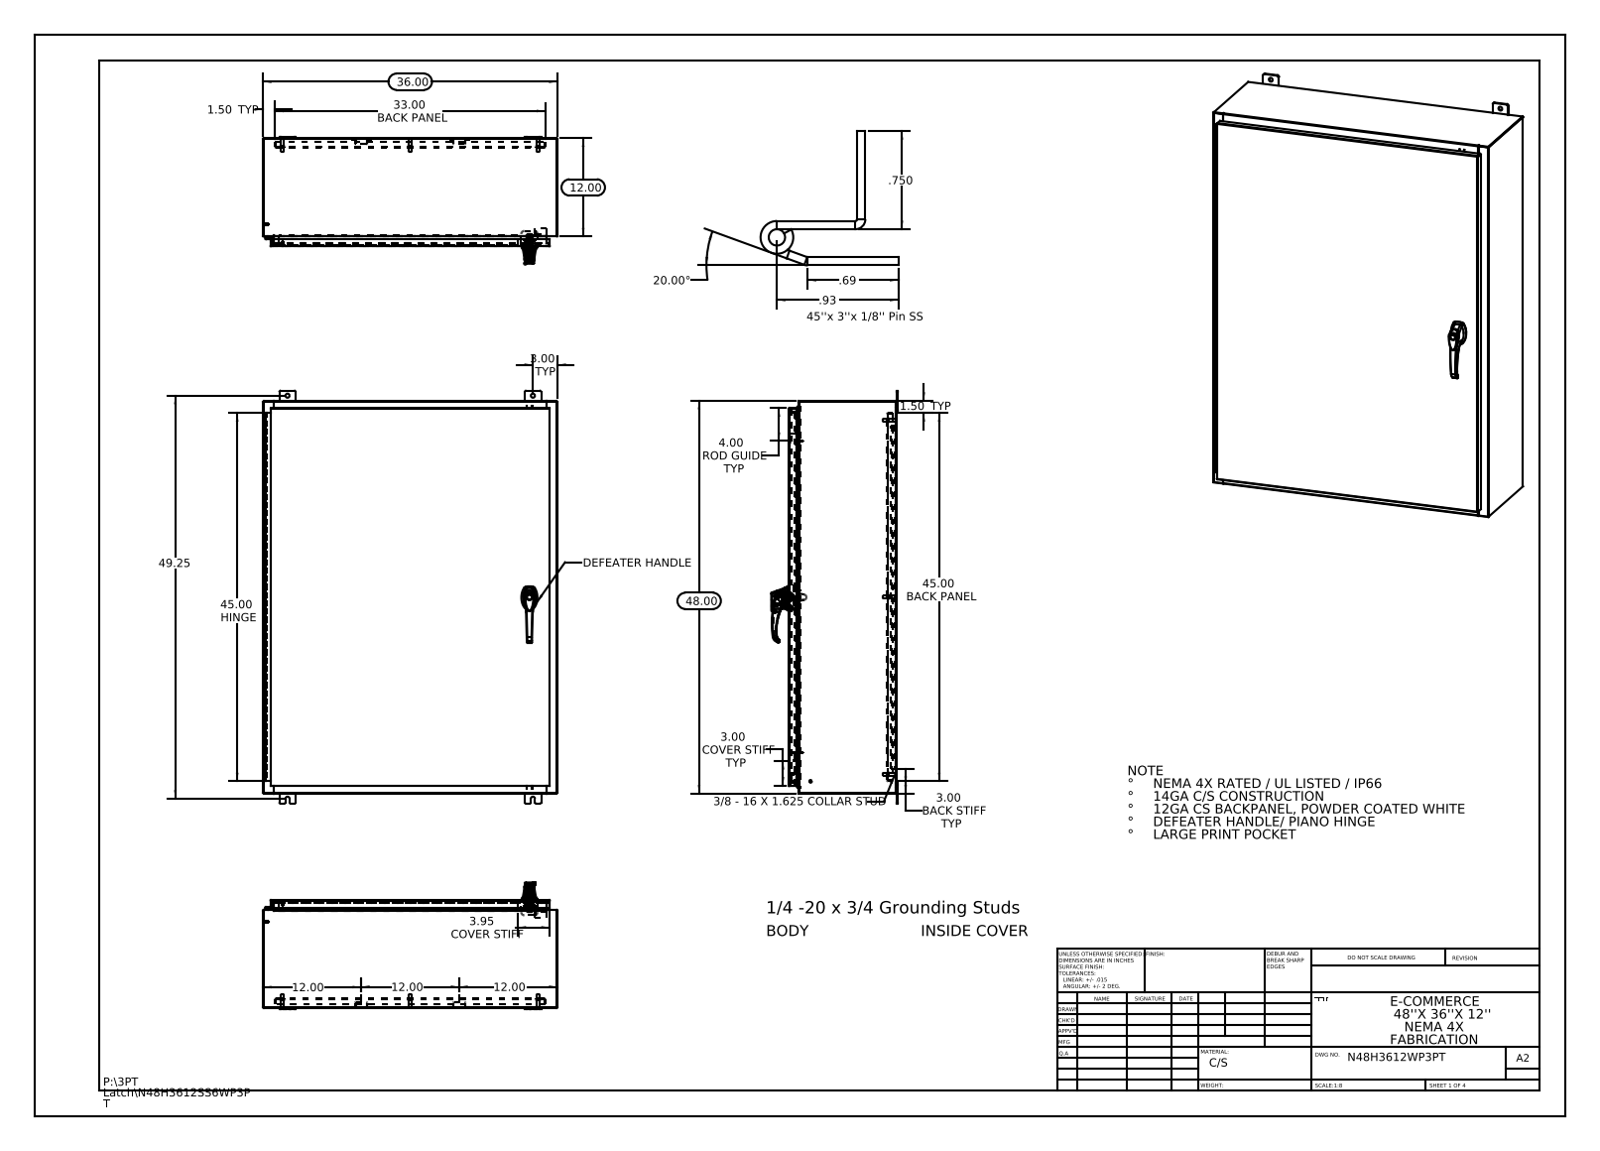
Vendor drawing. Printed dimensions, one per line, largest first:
49.25
48.00
45.00 HINGE
45.00 BACK PANEL
36.00
33.00 BACK PANEL
20.00°
12.00
12.00
12.00
12.00
4.00 ROD GUIDE TYP
3.95 COVER STIFF
3.00 TYP
3.00 BACK STIFF TYP
3.00 COVER STIFF TYP
1.50 TYP
1.50 TYP
.93
.750
.69
